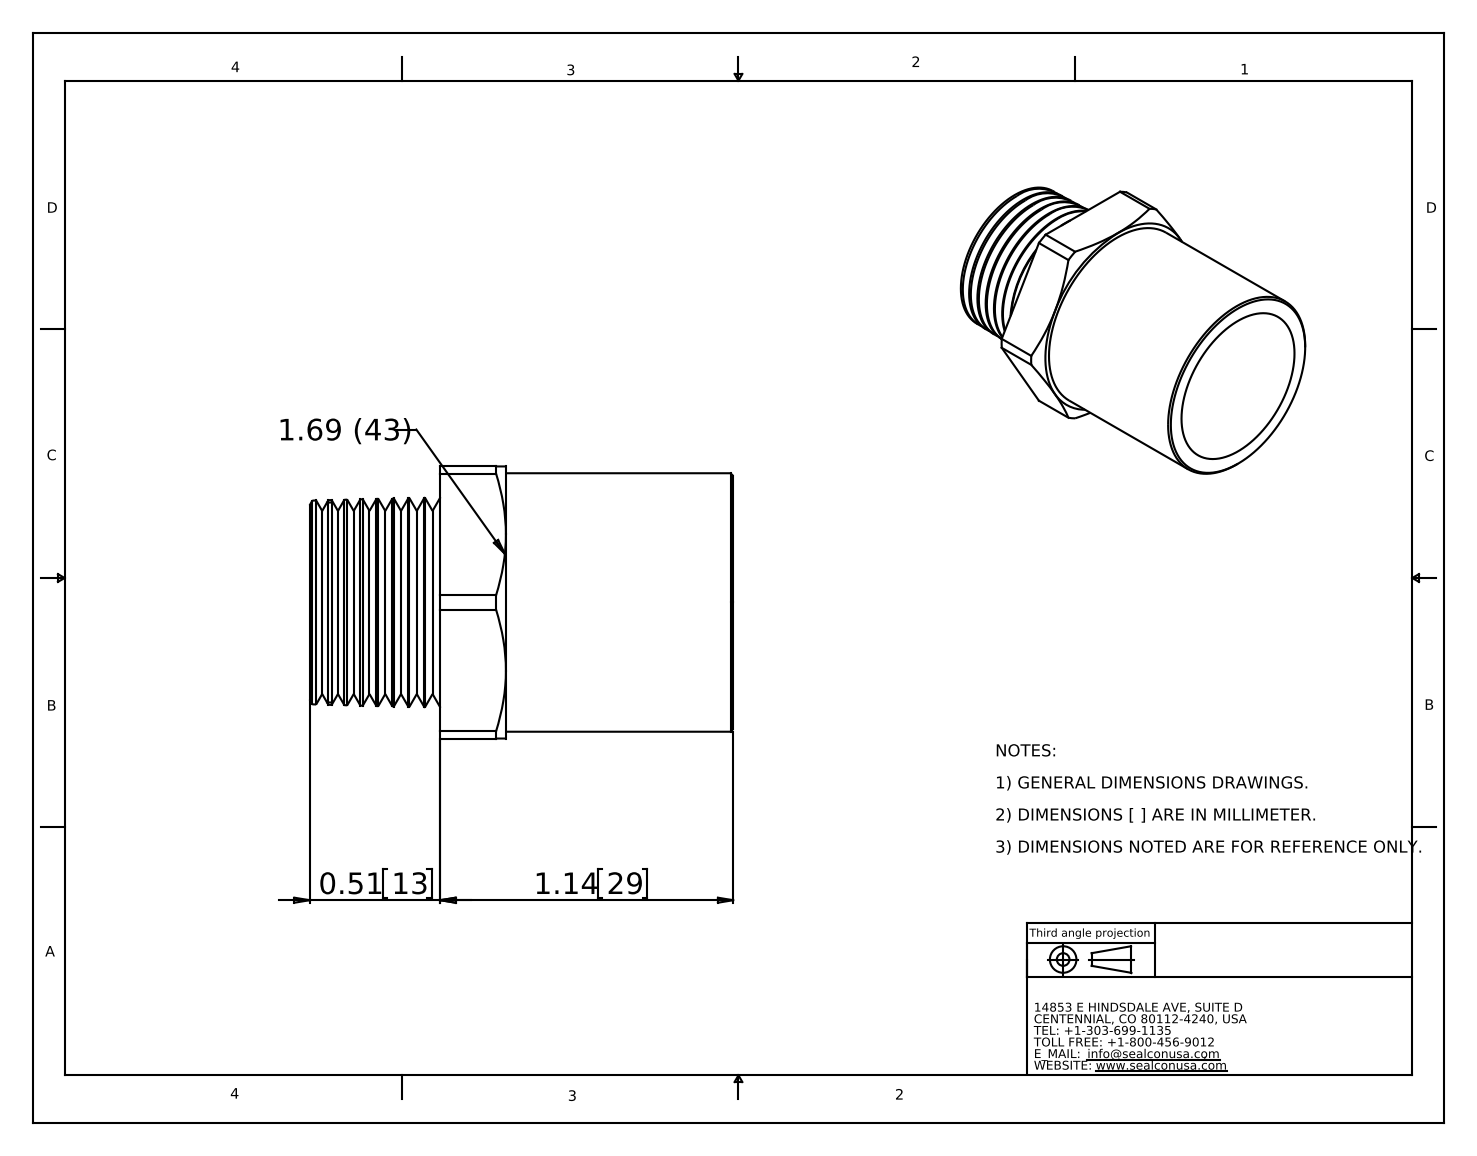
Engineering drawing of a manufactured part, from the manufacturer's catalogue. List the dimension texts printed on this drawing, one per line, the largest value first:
1.14 29
0.51 13
